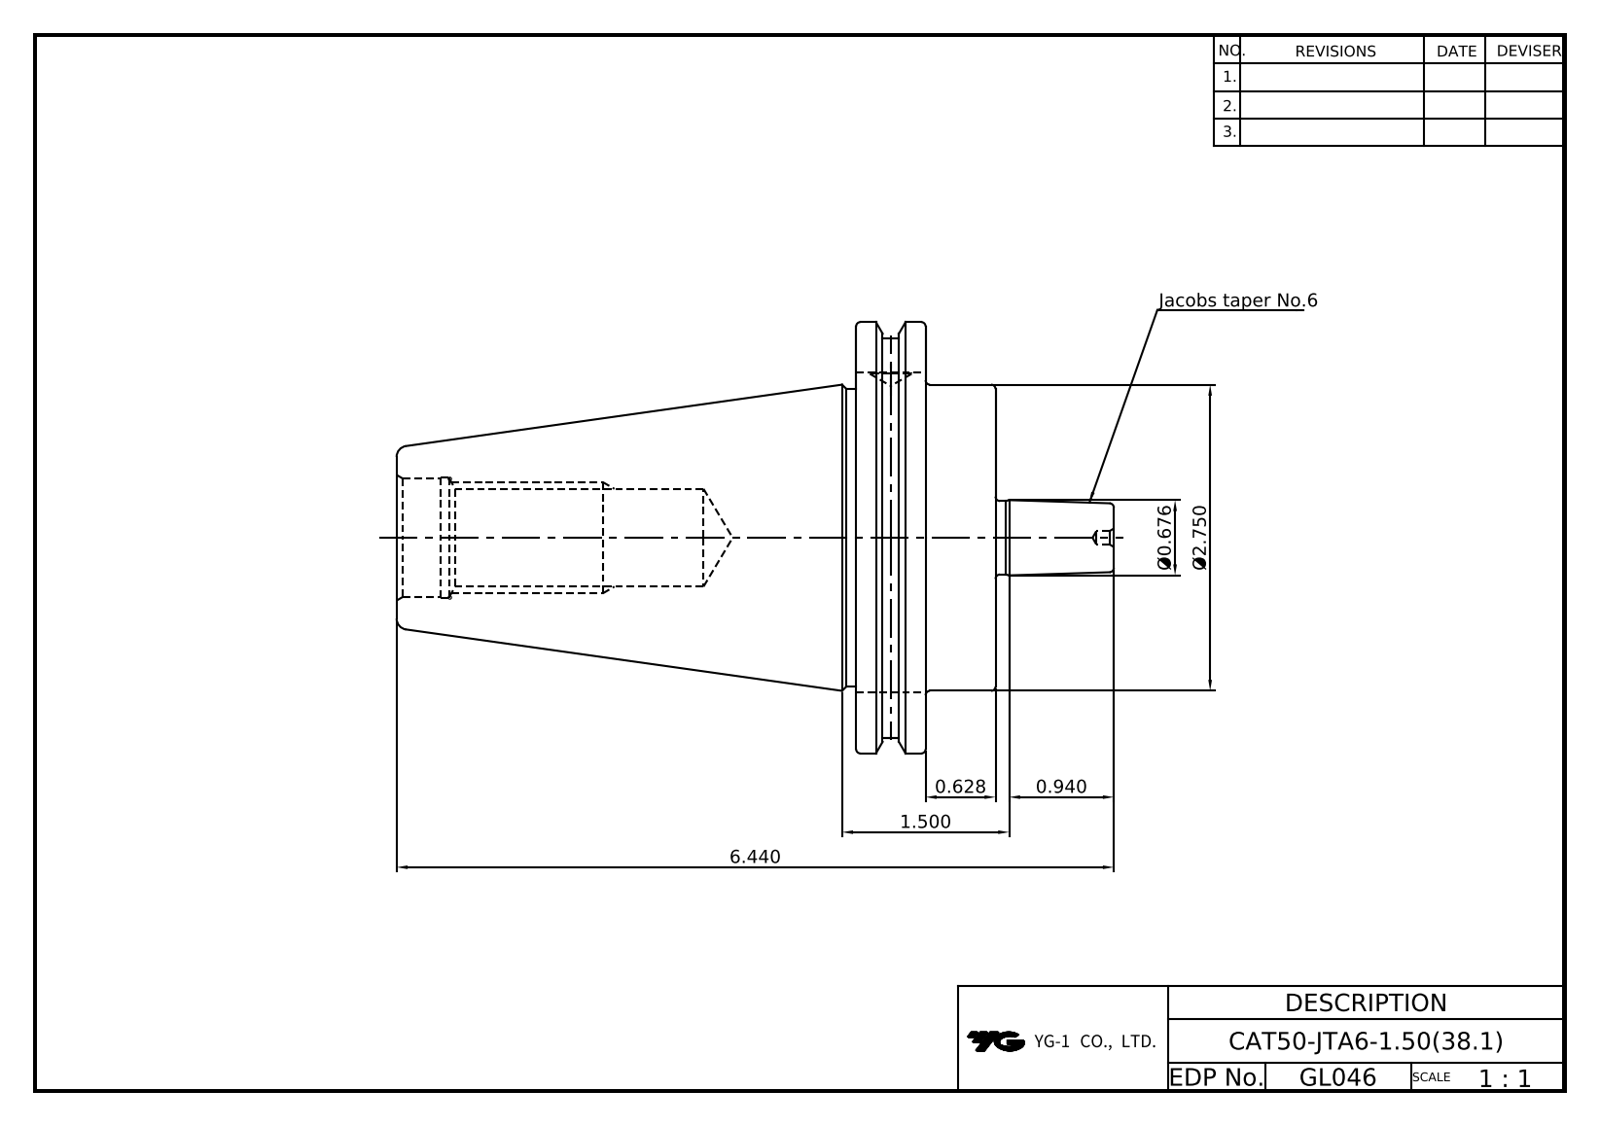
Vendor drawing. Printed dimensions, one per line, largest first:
6.440
Ø2.750
1.500
0.940
Ø0.676
0.628
